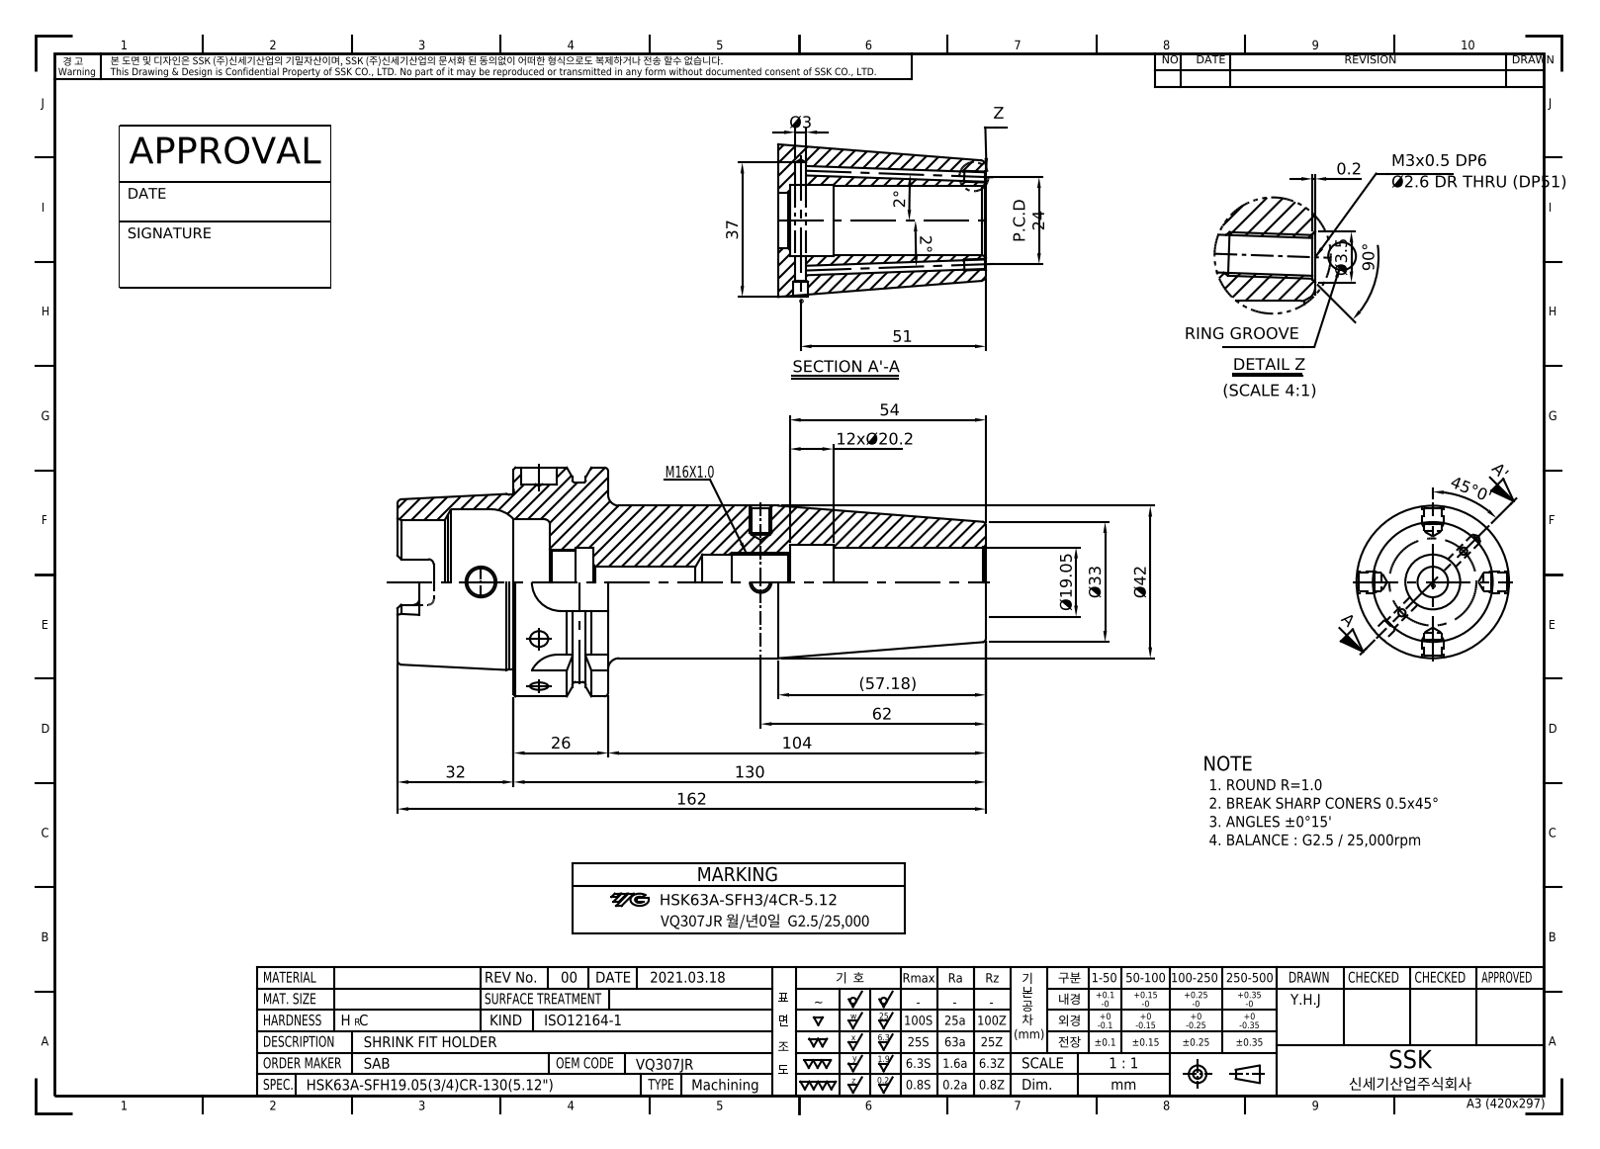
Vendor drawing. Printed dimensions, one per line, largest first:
162
130
104
90°
62
(57.18)
54
51
45°0'
Ø42
37
Ø33
32
26
P.C.D 24
12xØ20.2
Ø19.05
Ø3.5
Ø3
2°
2°
0.2
